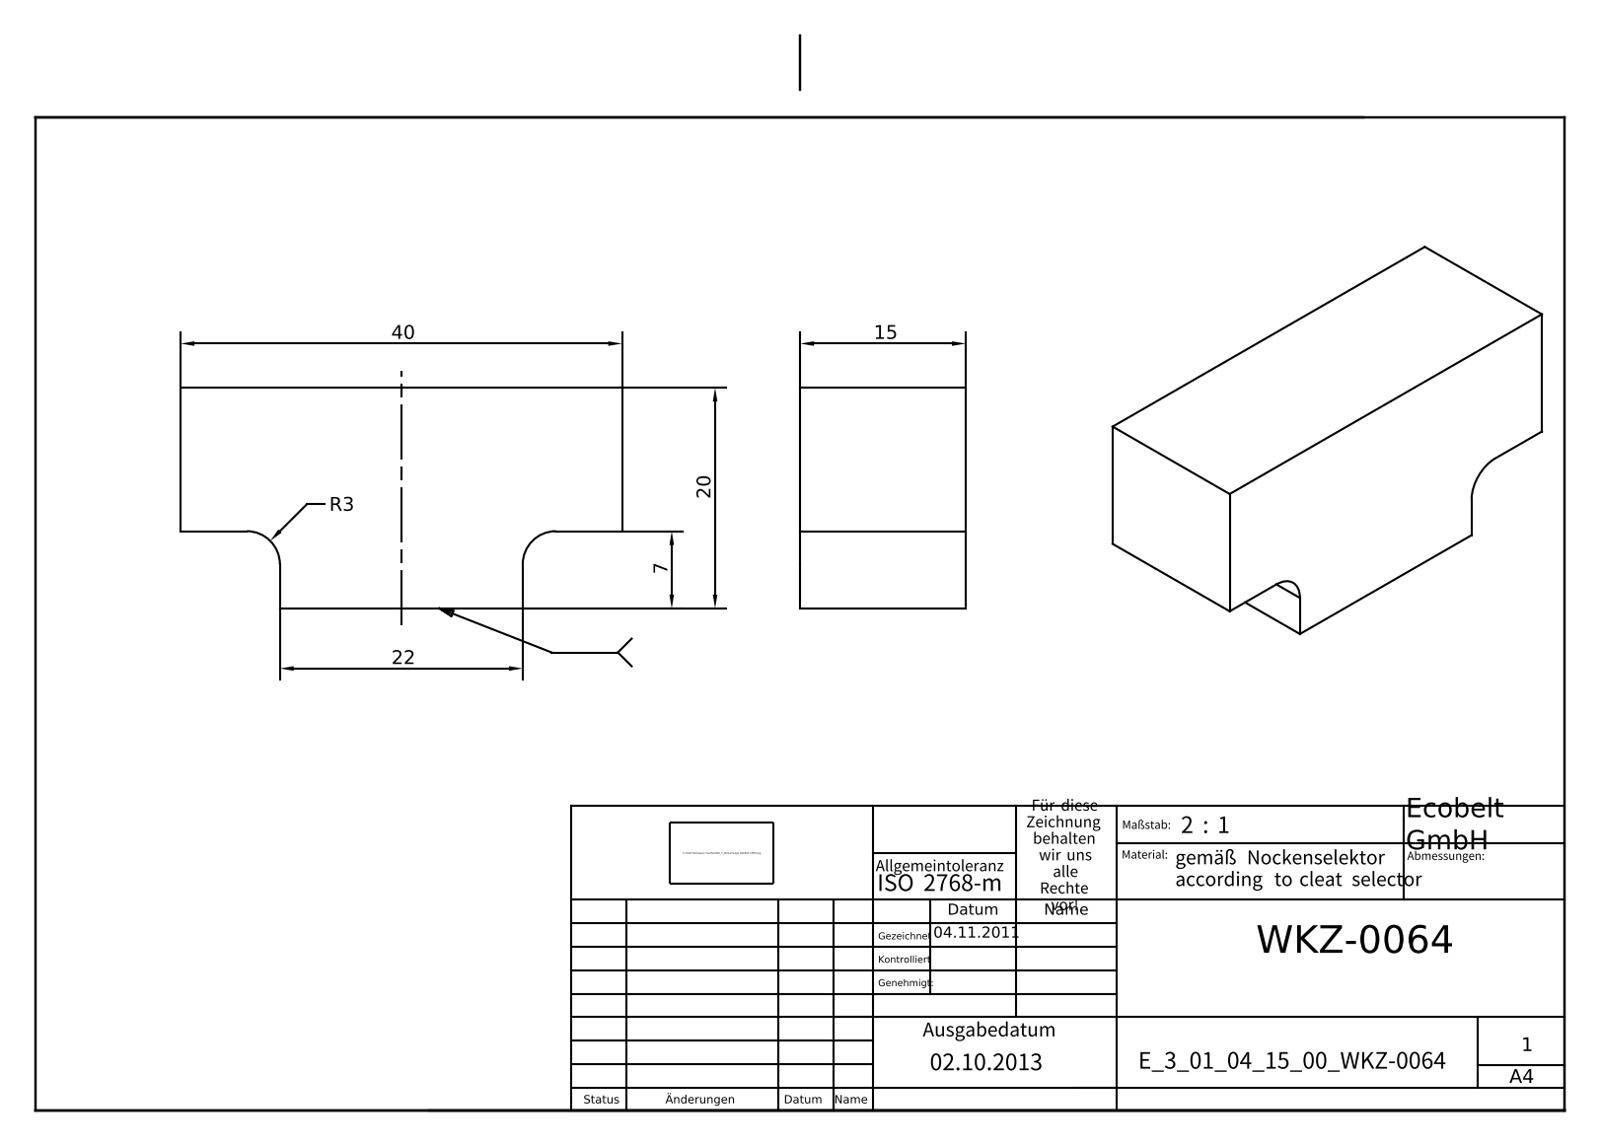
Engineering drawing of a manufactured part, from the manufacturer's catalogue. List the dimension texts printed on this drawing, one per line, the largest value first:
40
22
20
15
7
R3
